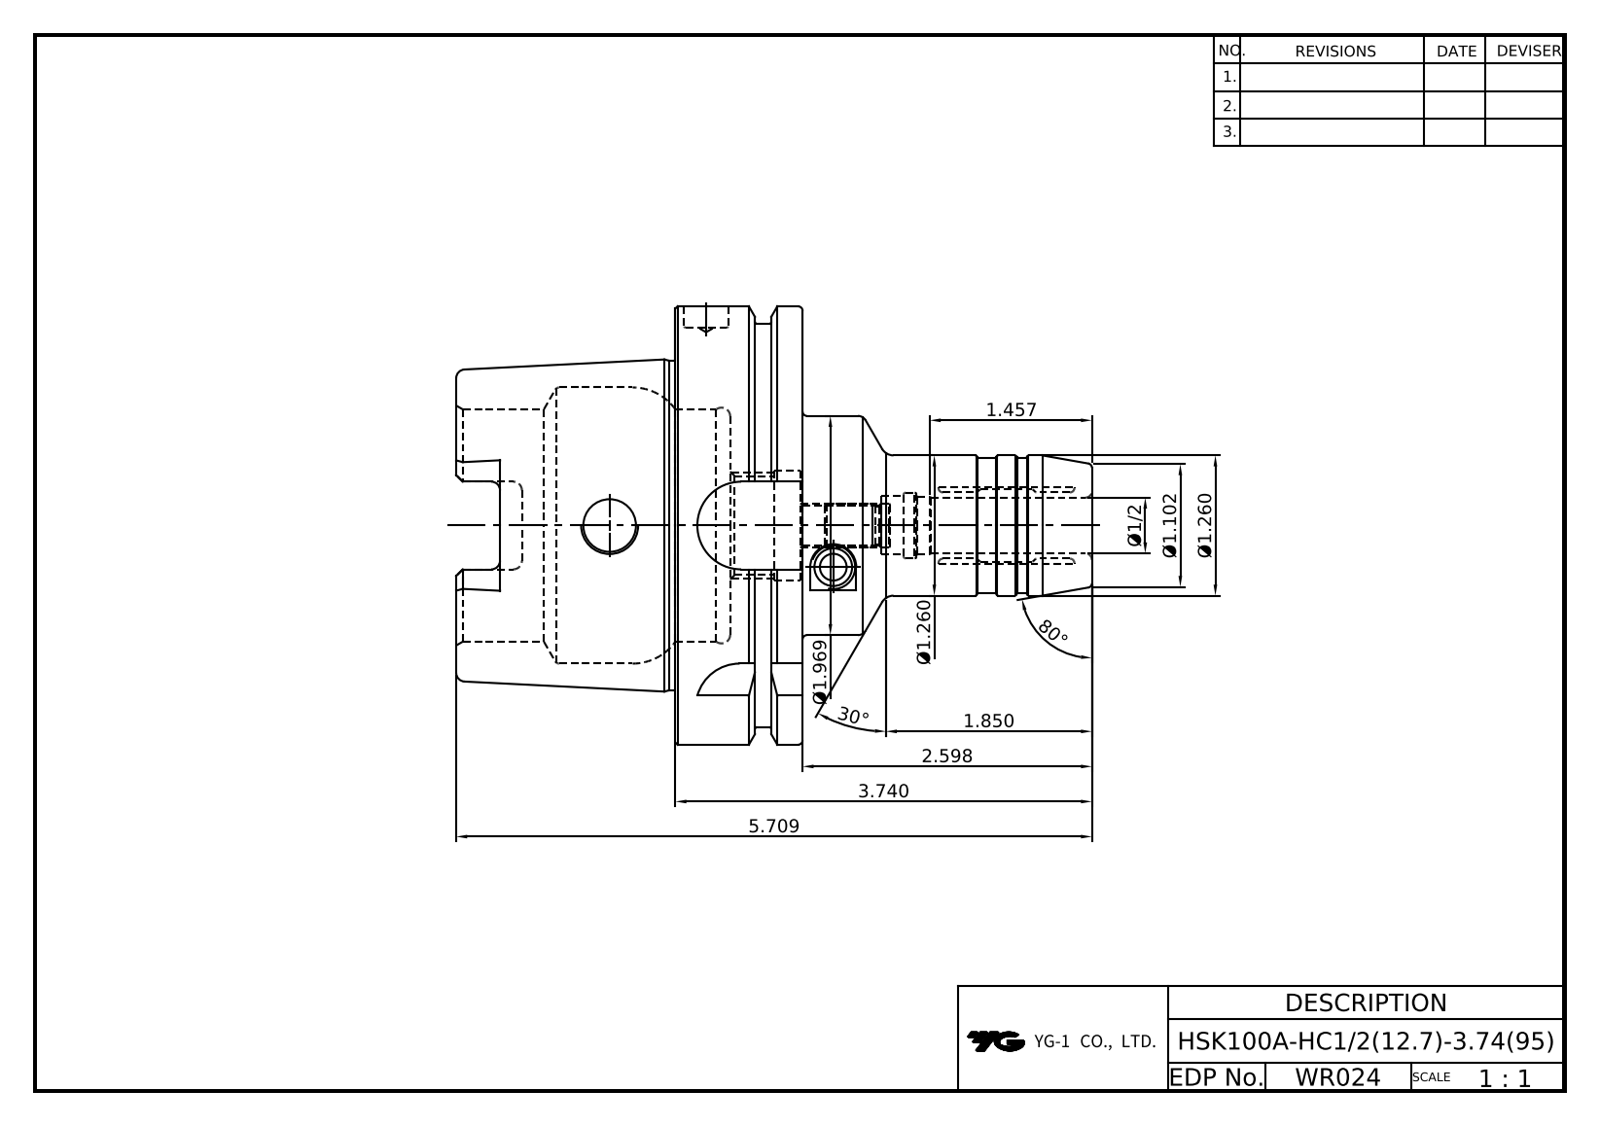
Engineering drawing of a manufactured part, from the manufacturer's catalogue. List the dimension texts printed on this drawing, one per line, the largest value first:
80°
30°
5.709
3.740
2.598
Ø1.969
1.850
1.457
Ø1.260
Ø1.260
Ø1.102
Ø1/2
